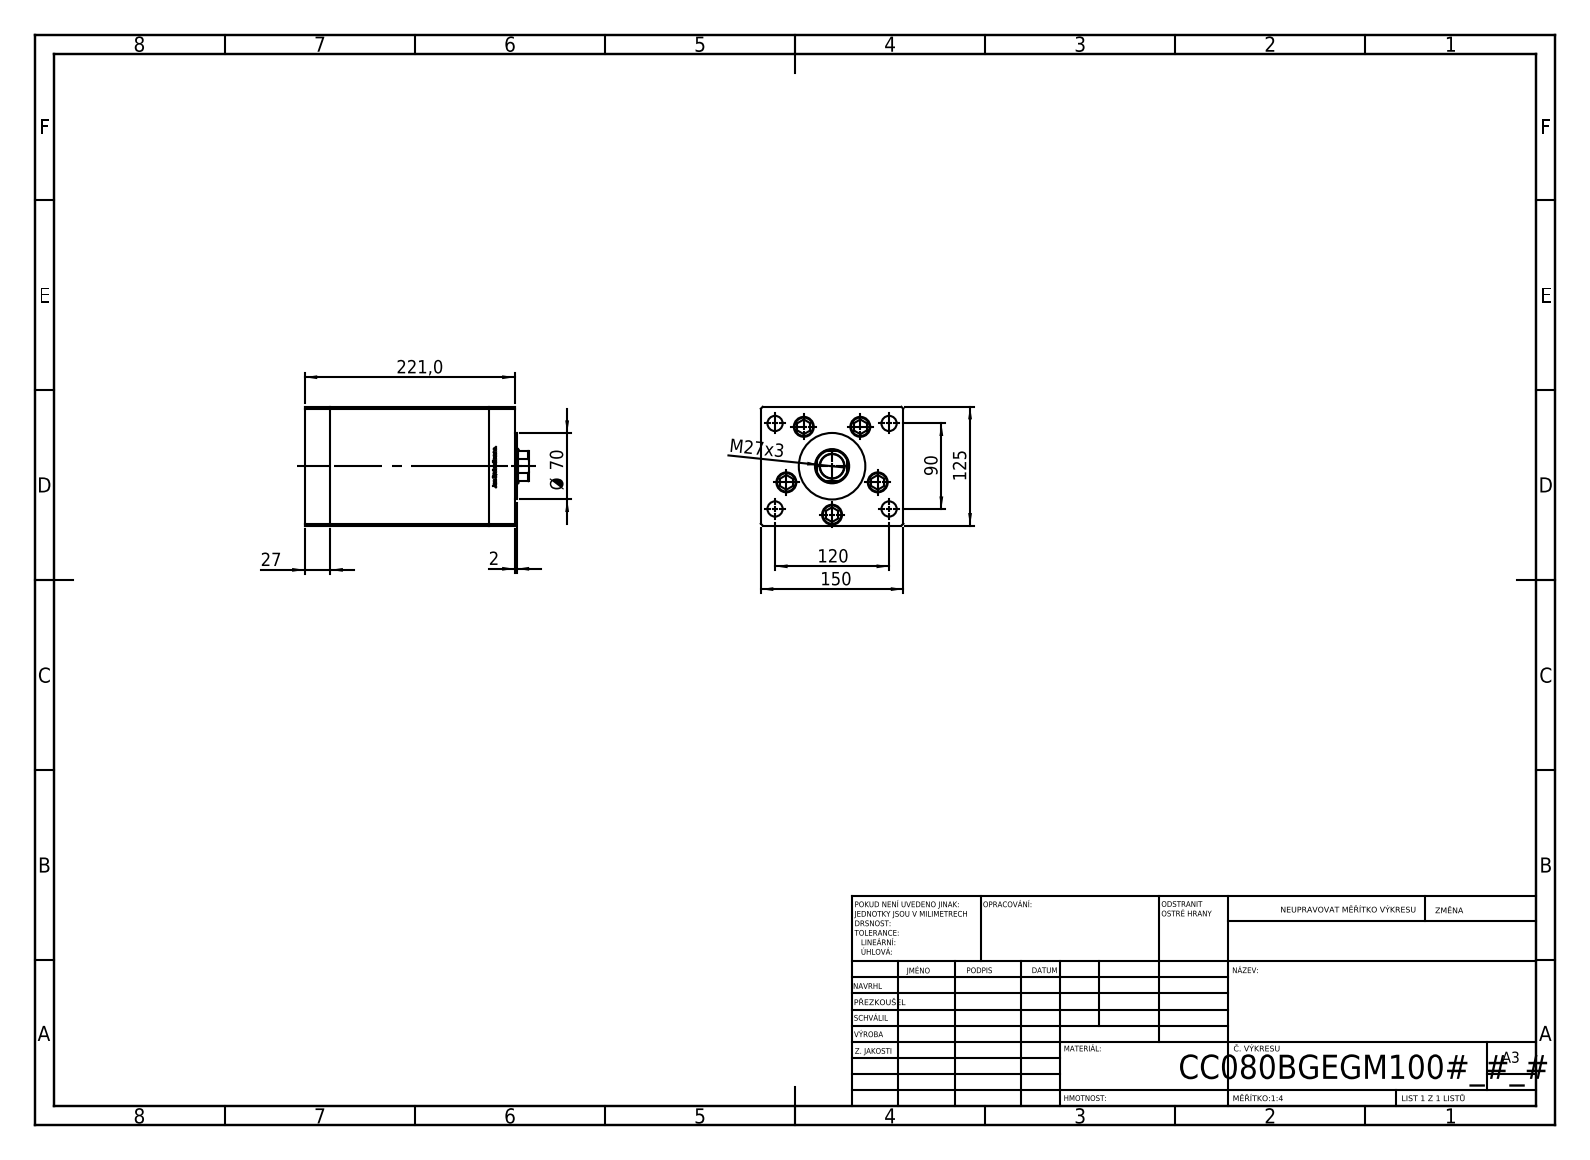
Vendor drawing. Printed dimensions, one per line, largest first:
221,0
150
125
120
90
Ø 70
27
M27x3
2
